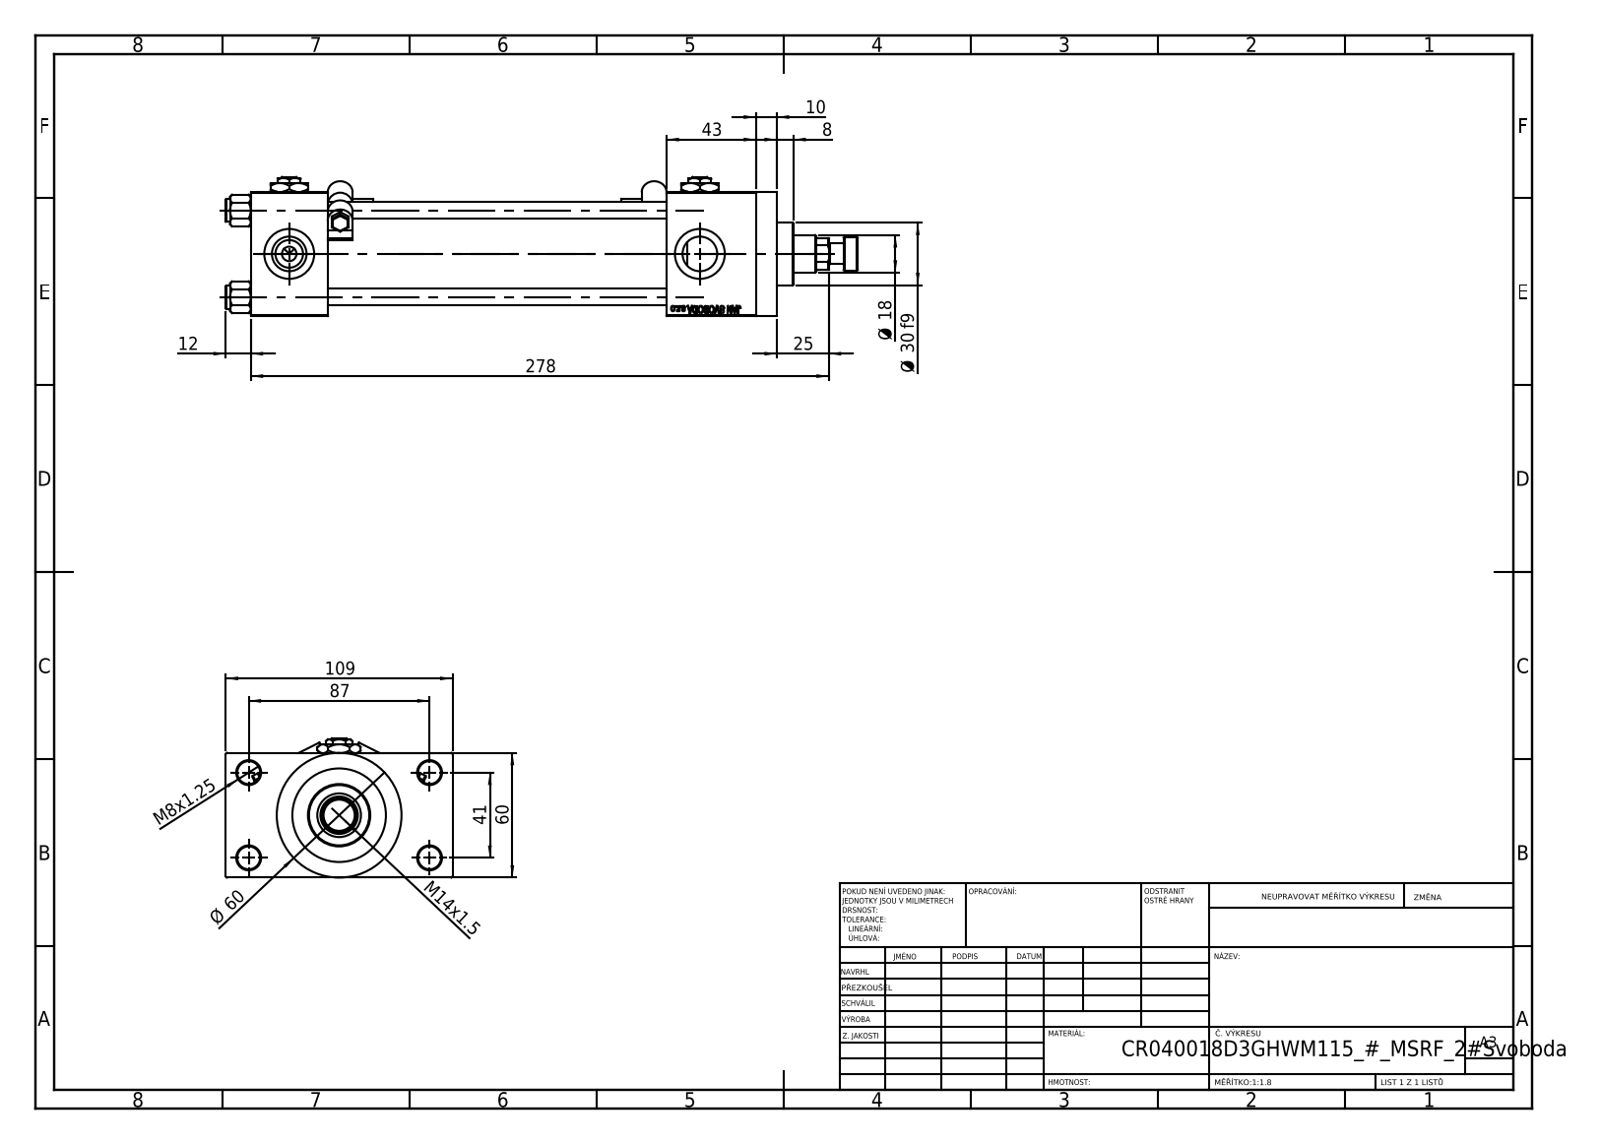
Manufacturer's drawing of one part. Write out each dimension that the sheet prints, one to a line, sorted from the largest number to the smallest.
278
109
87
Ø 60
60
43
41
Ø 30 f9
25
Ø 18
M14x1.5
12
10
8
M8x1.25
